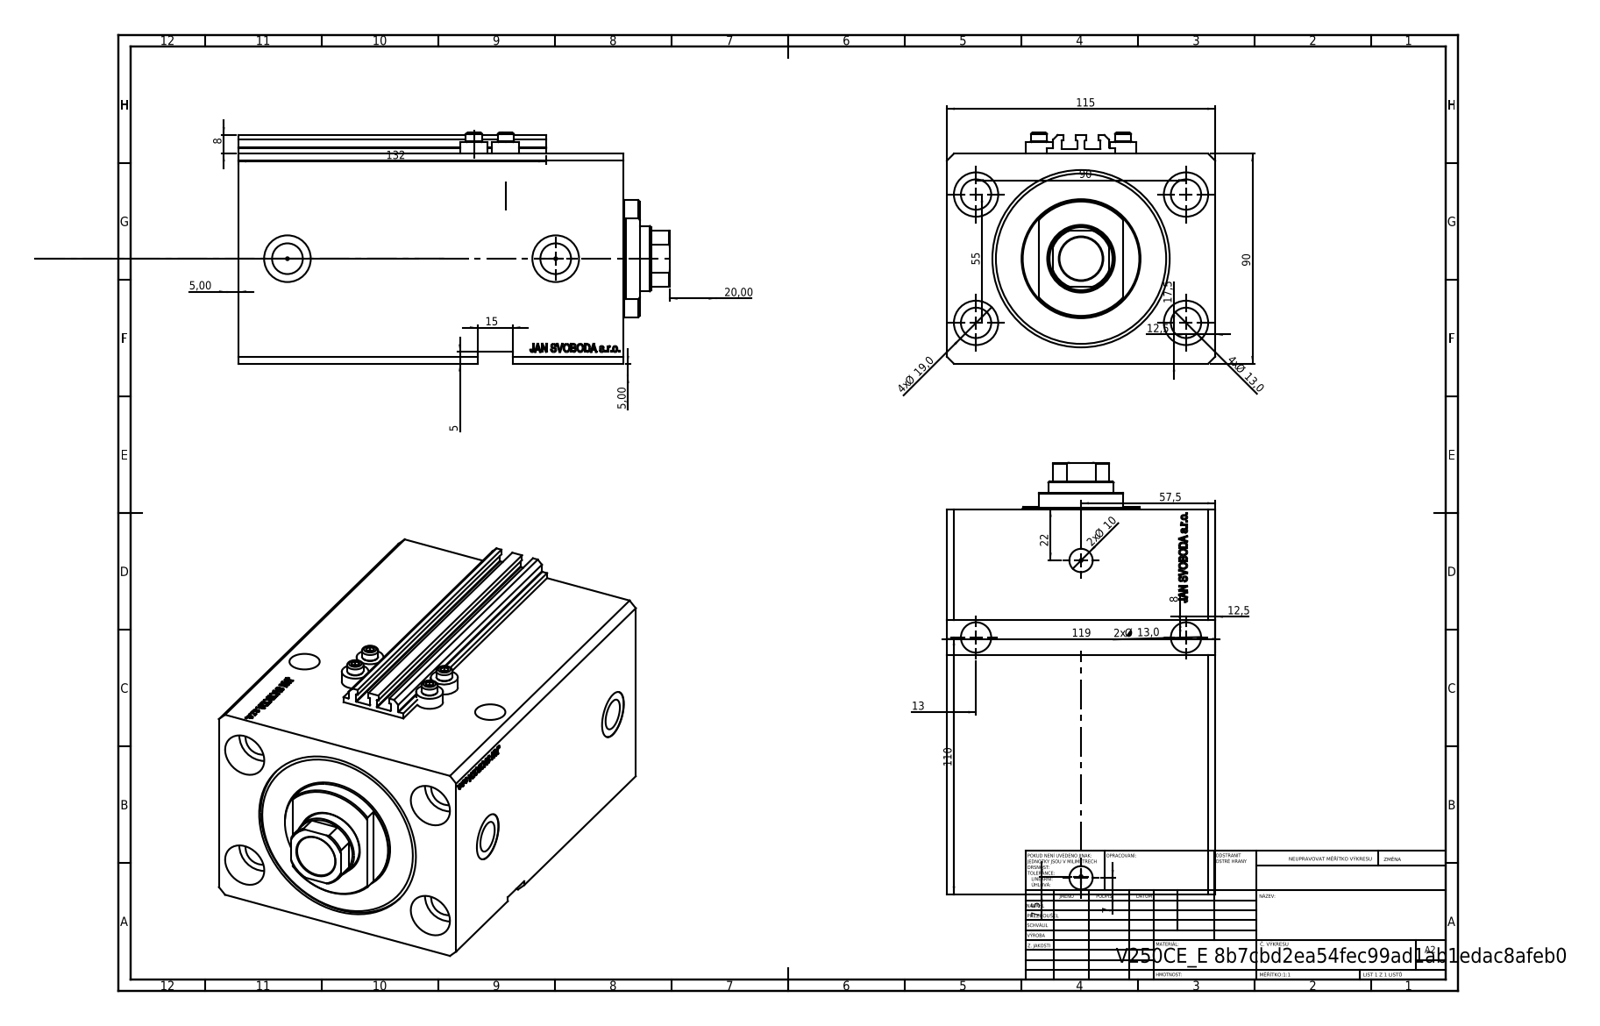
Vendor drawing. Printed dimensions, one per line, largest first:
132
119
115
110
90
90
57,5
55
22
20,00
4x Ø 19,0
17,5
15
4x Ø 13,0
2x Ø 13,0
13
12,5
12,5
2x Ø 10
8
8
7,5
7
5,00
5,00
5
